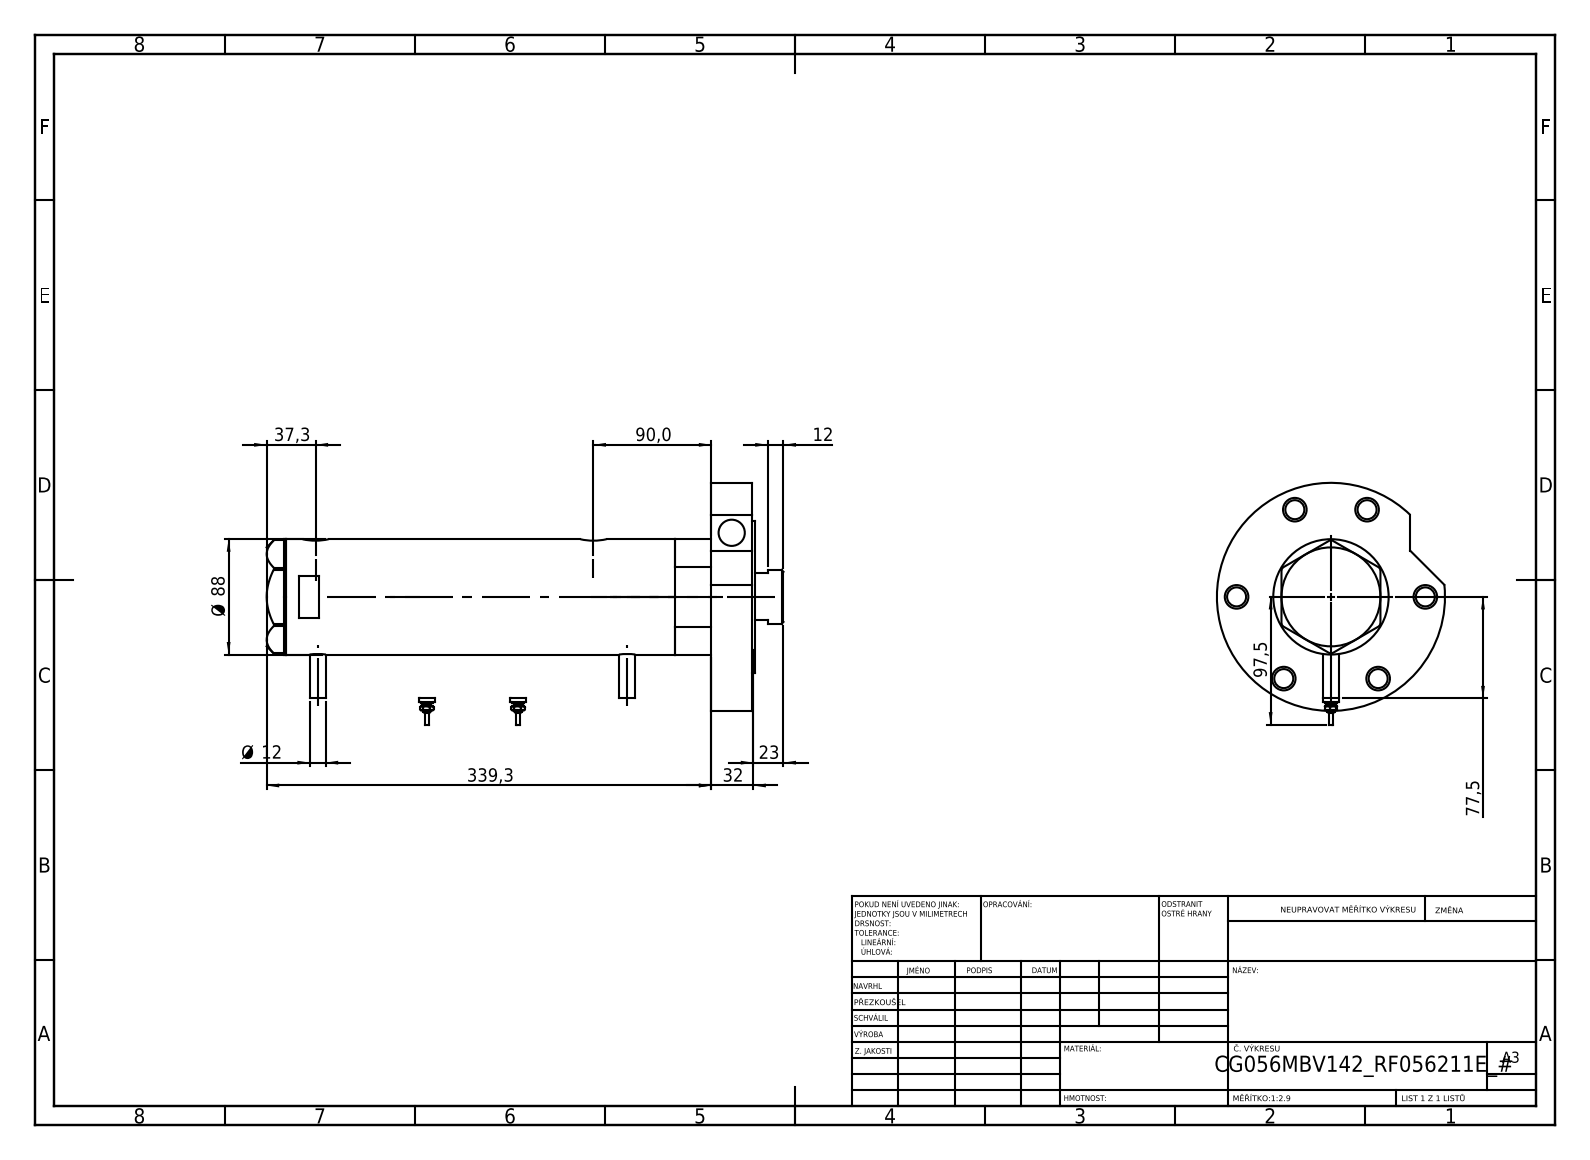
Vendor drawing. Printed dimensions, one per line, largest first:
339,3
97,5
90,0
Ø 88
77,5
37,3
32
23
12
Ø 12
